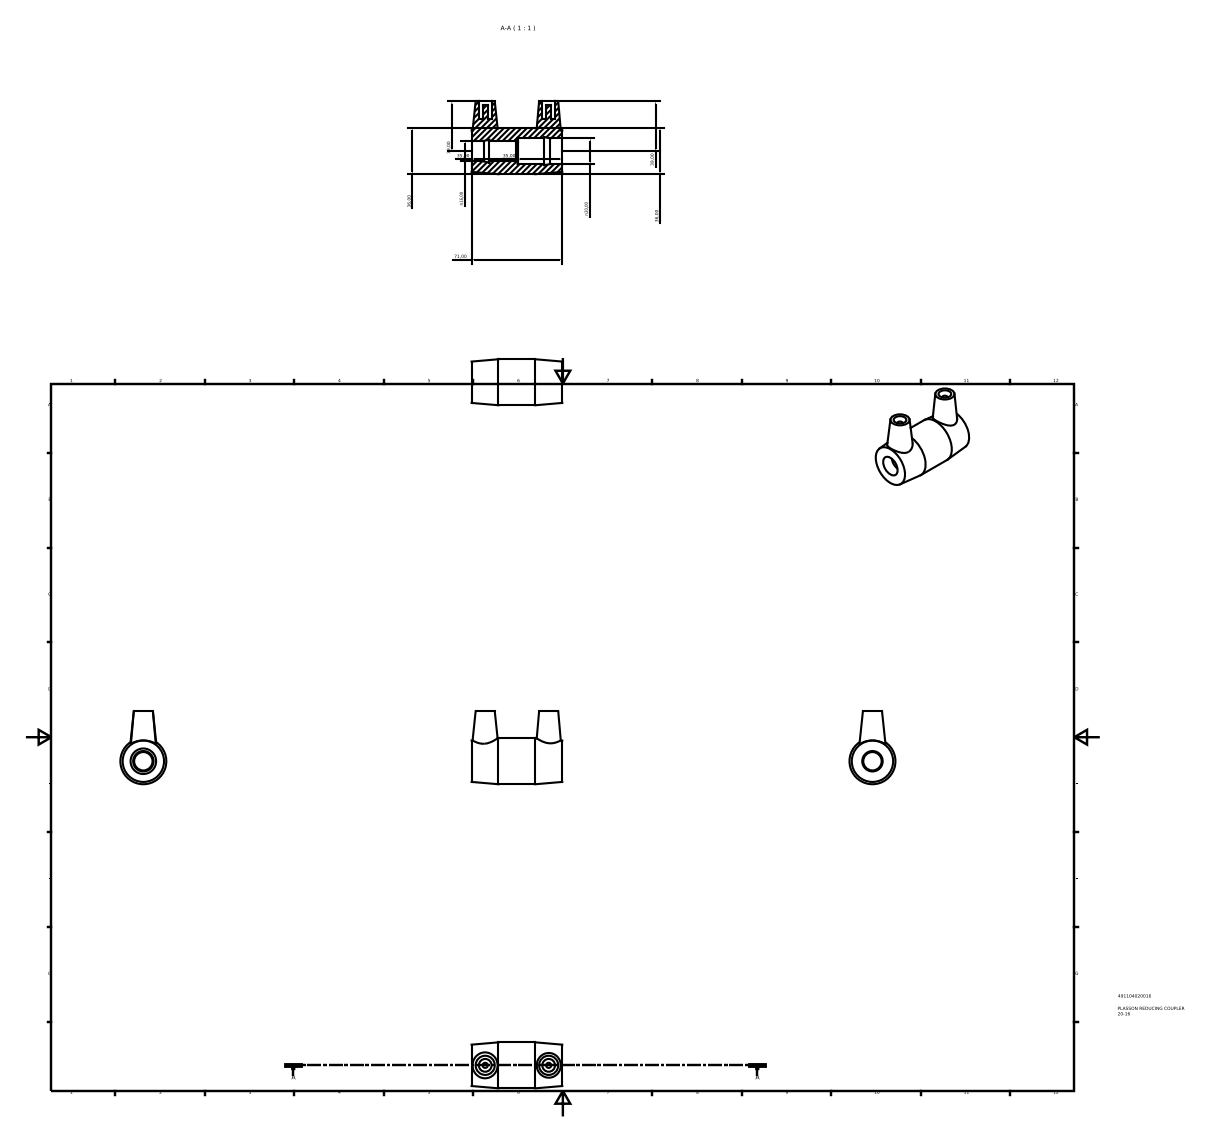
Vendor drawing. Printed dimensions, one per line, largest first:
71,00
39,00
39,00
36,00
36,00
35,00
35,00
n20,00
n16,00
